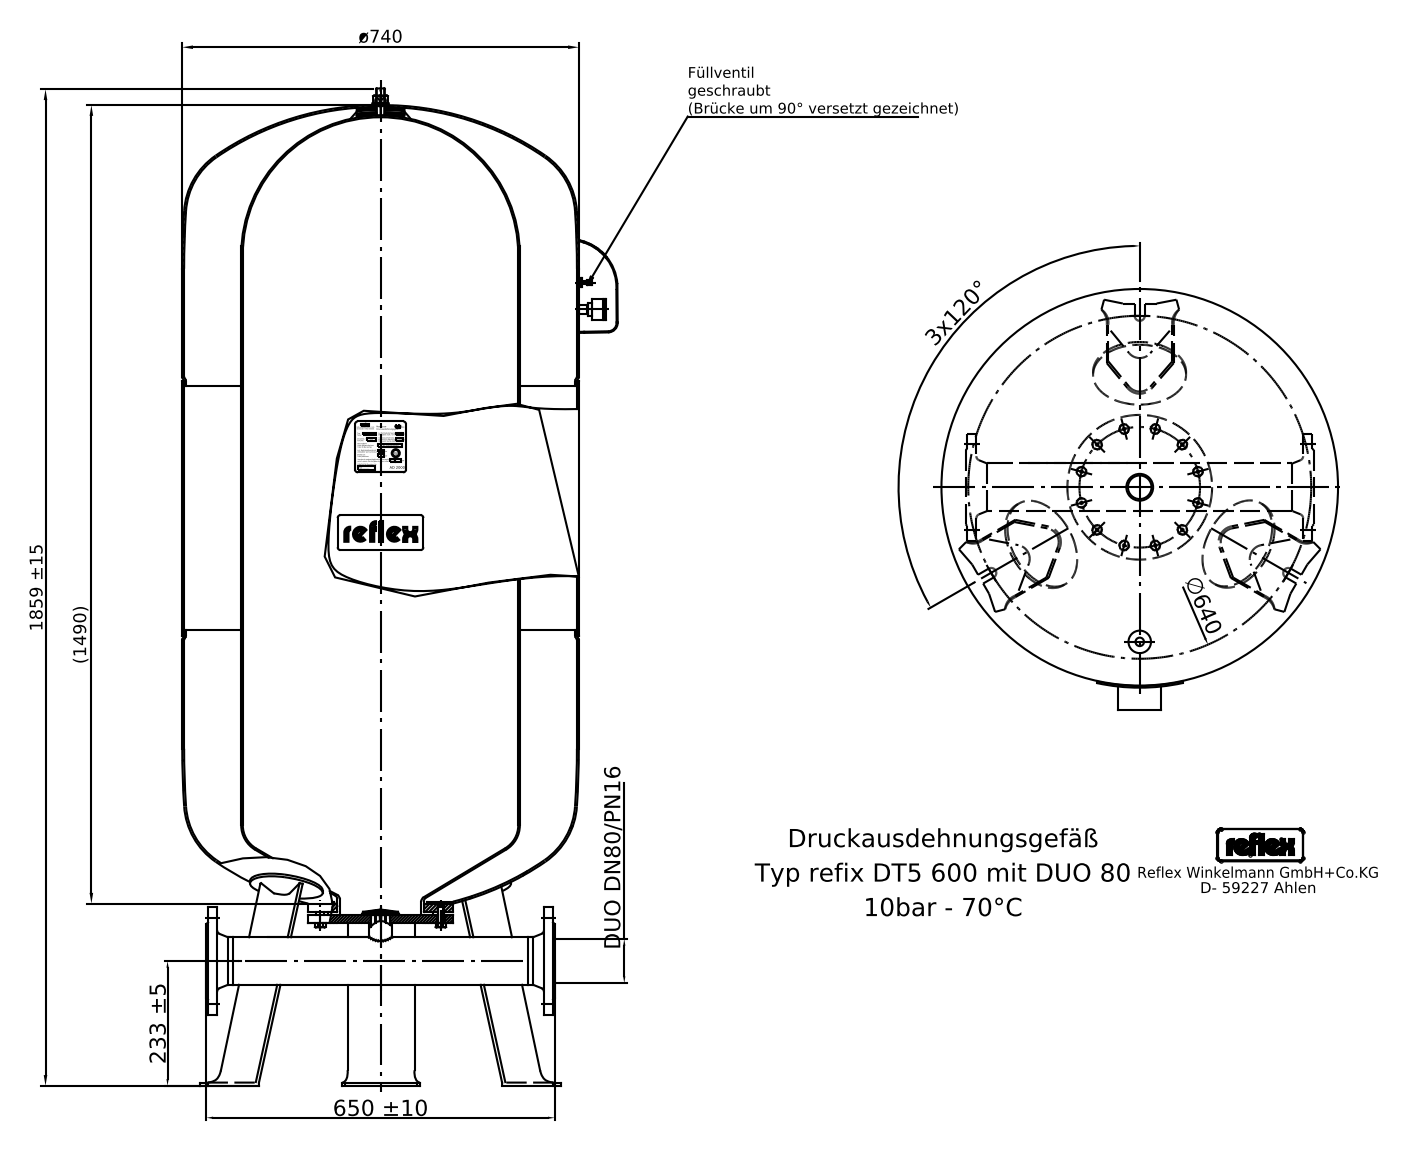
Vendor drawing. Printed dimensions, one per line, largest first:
1859 ±15
(1490)
ø740
650 ±10
∅640
233 ±5
3x120°
DUO DN80/PN16
